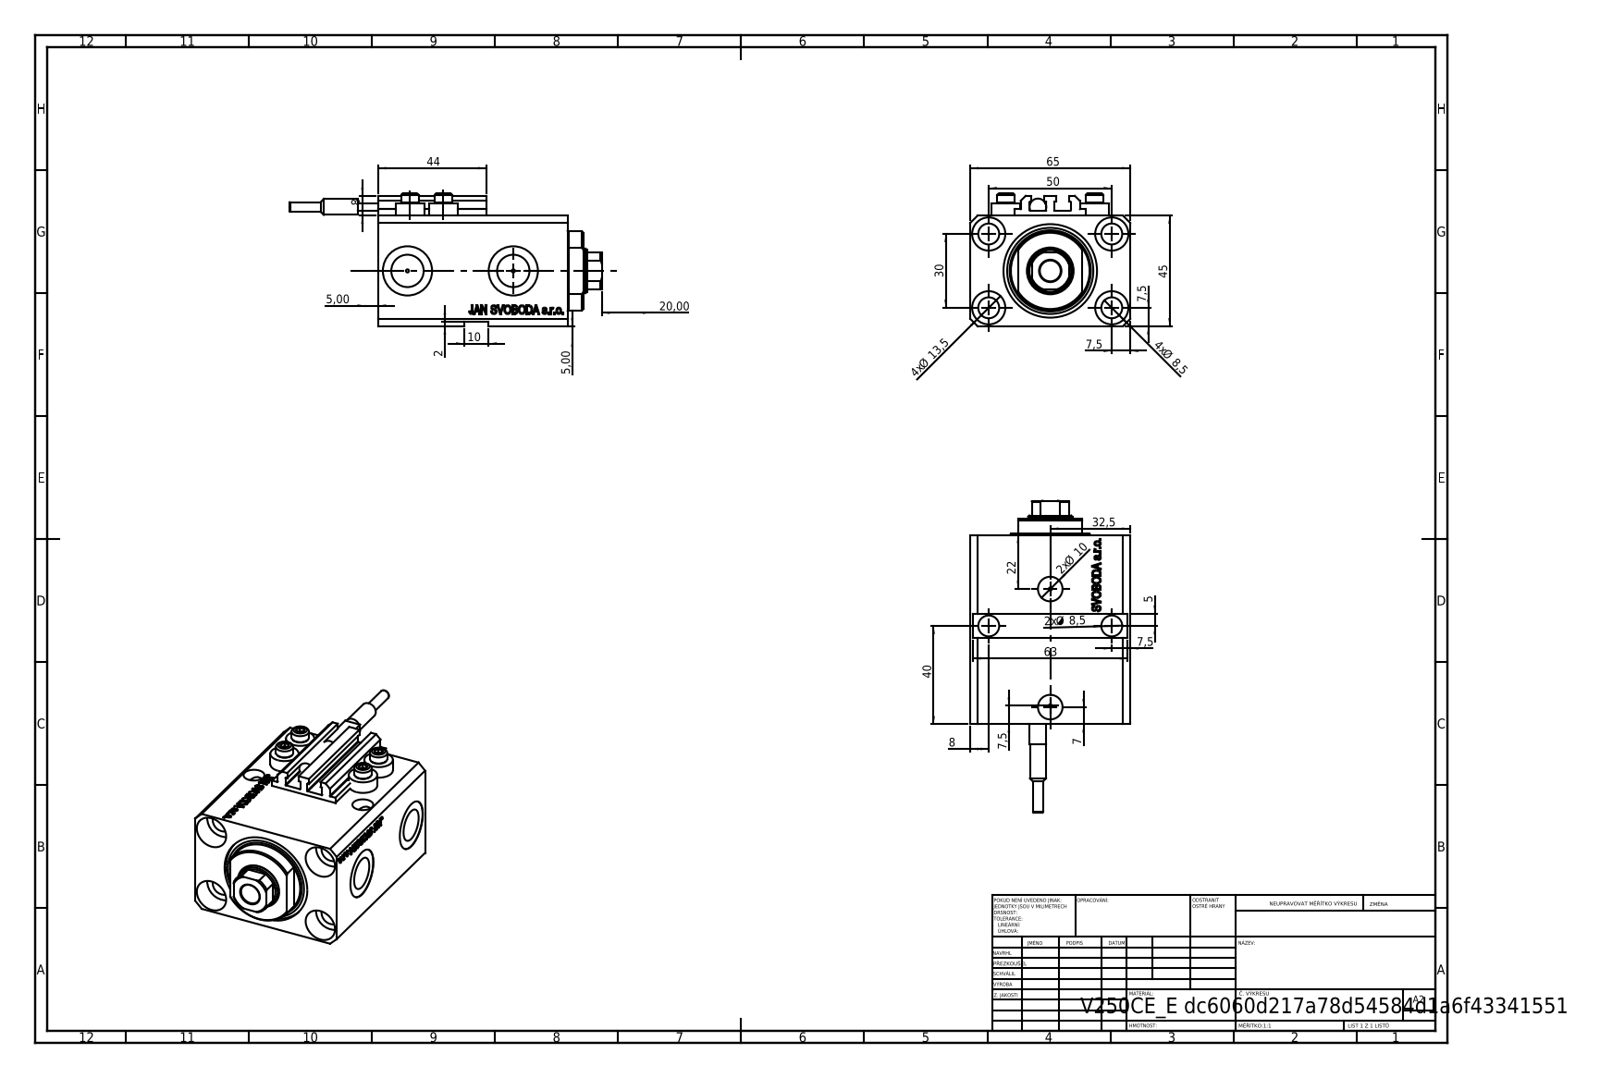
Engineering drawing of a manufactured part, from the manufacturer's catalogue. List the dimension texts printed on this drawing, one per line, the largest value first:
65
63
50
45
44
40
32,5
30
22
20,00
4x Ø 13,5
10
2x Ø 10
4x Ø 8,5
2x Ø 8,5
8
8
7,5
7,5
7,5
7,5
7
5,00
5,00
5
2
